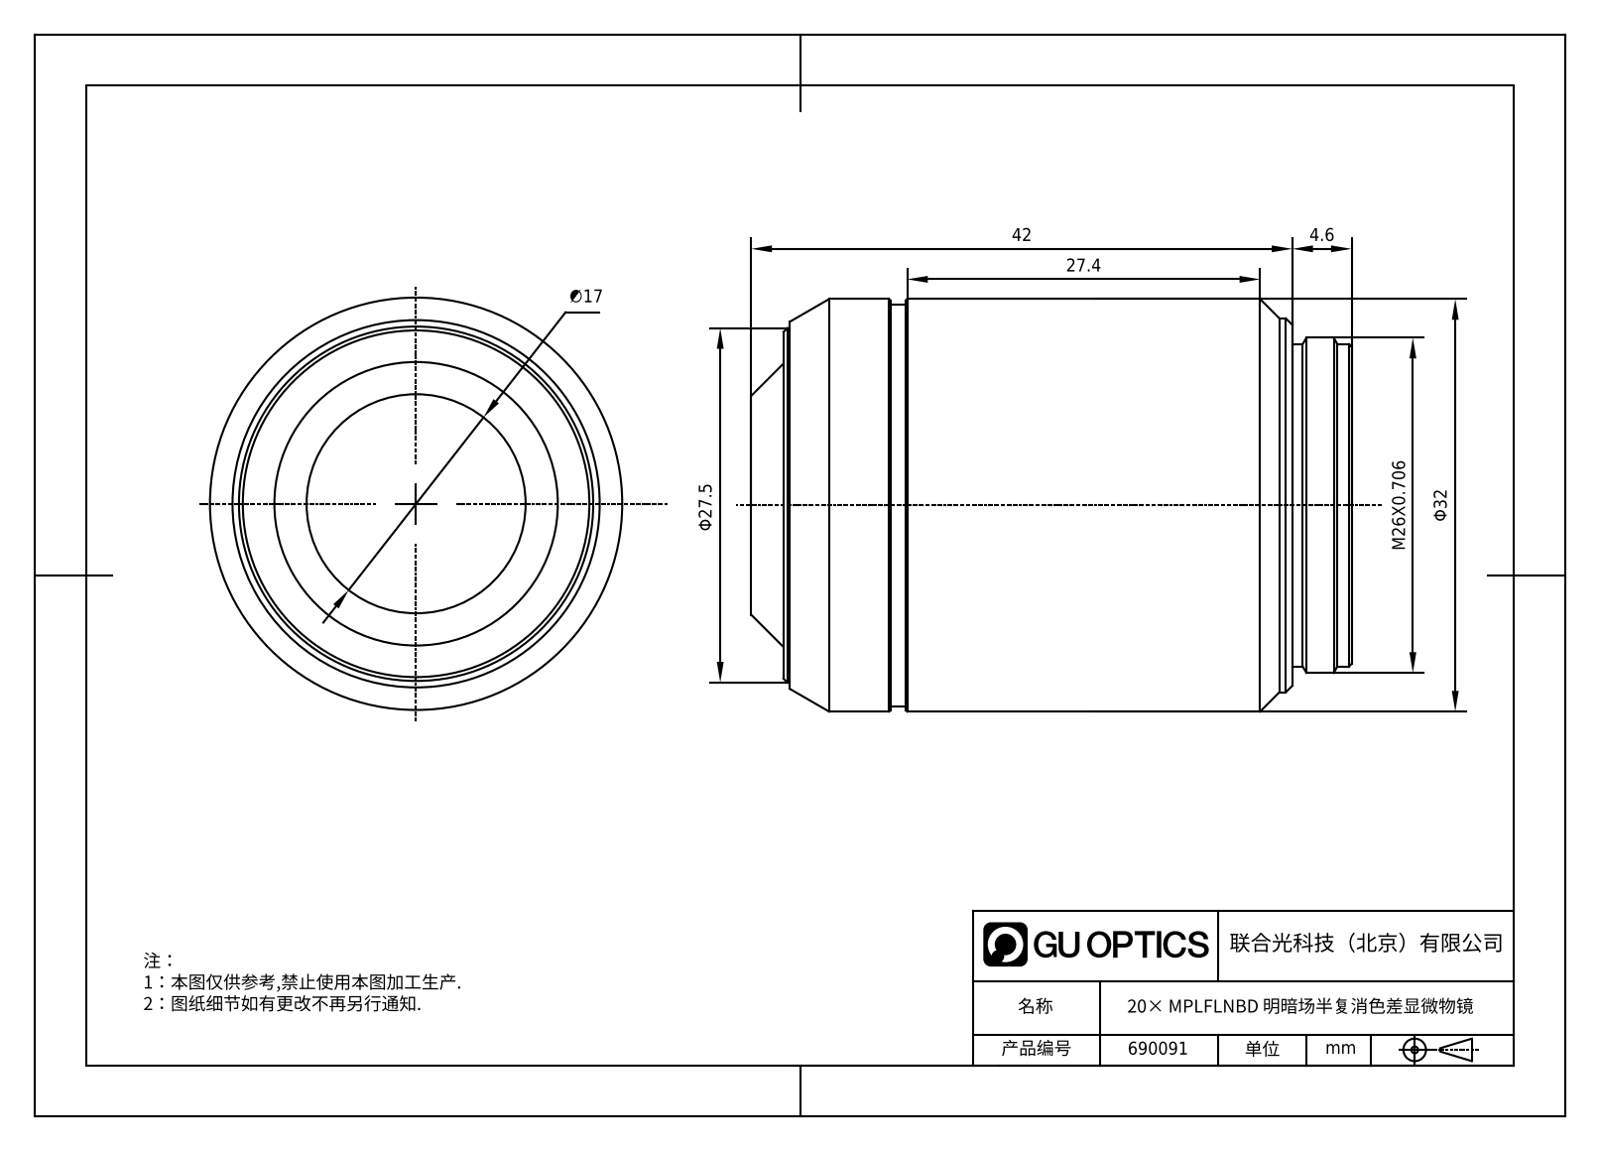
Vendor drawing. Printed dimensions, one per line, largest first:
42
Φ32
Φ27.5
27.4
M26X0.706
∅17
4.6
